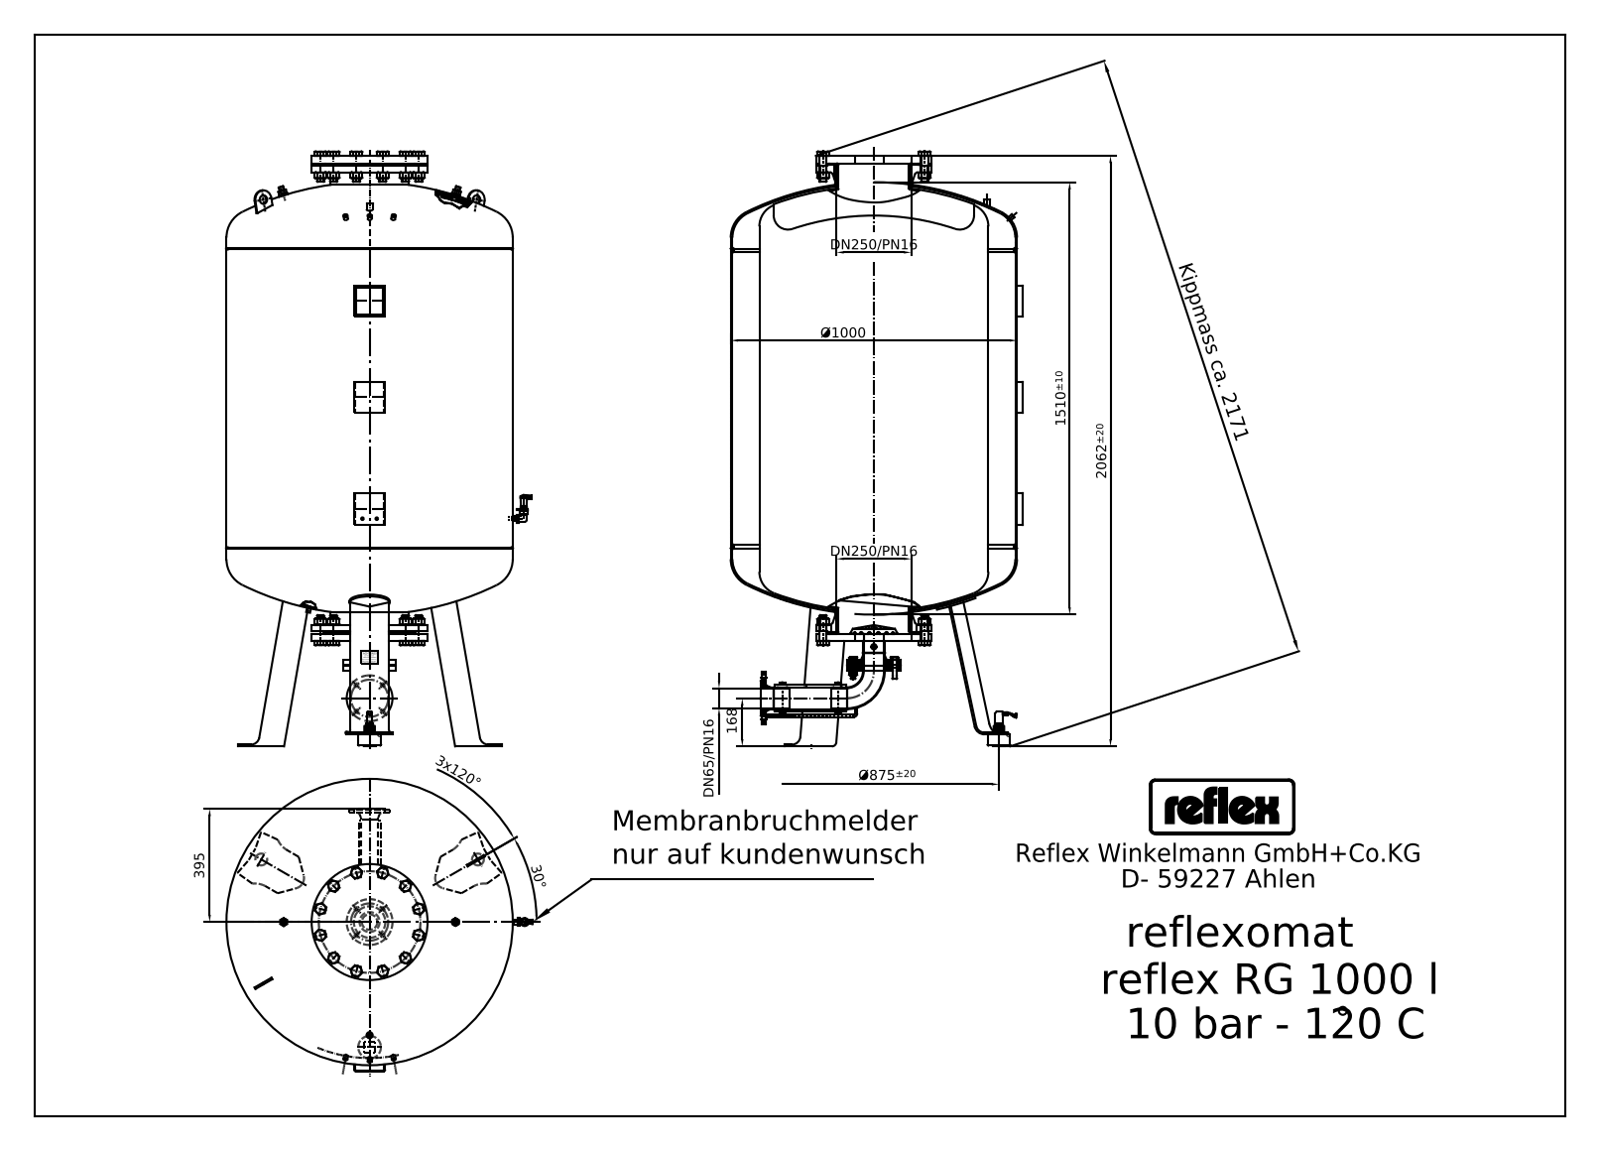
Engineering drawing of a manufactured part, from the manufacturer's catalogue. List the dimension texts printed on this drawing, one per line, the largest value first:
Kippmass ca. 2171
2062±20
1510±10
Ø1000
395
DN250/PN16
DN250/PN16
168
3x120°
DN65/PN16
30°
